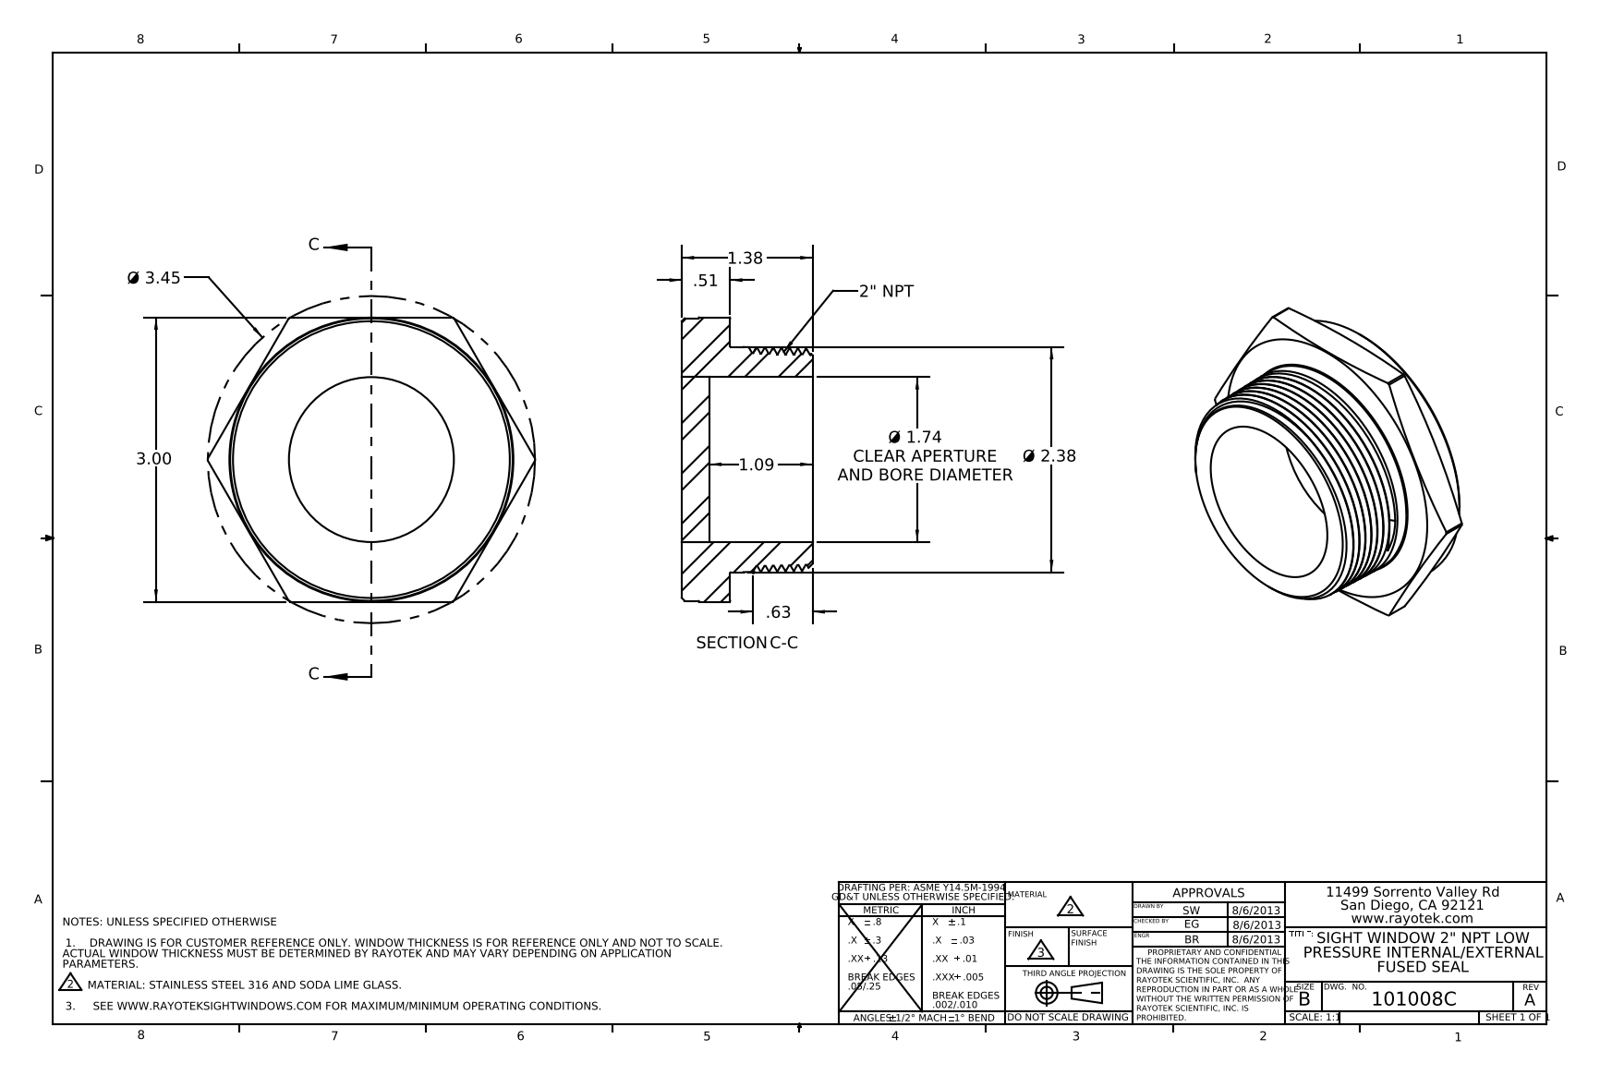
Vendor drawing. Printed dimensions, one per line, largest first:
Ø 3.45
3.00
Ø 2.38
Ø 1.74 CLEAR APERTURE AND BORE DIAMETER
1.38
1.09
.63
.51
